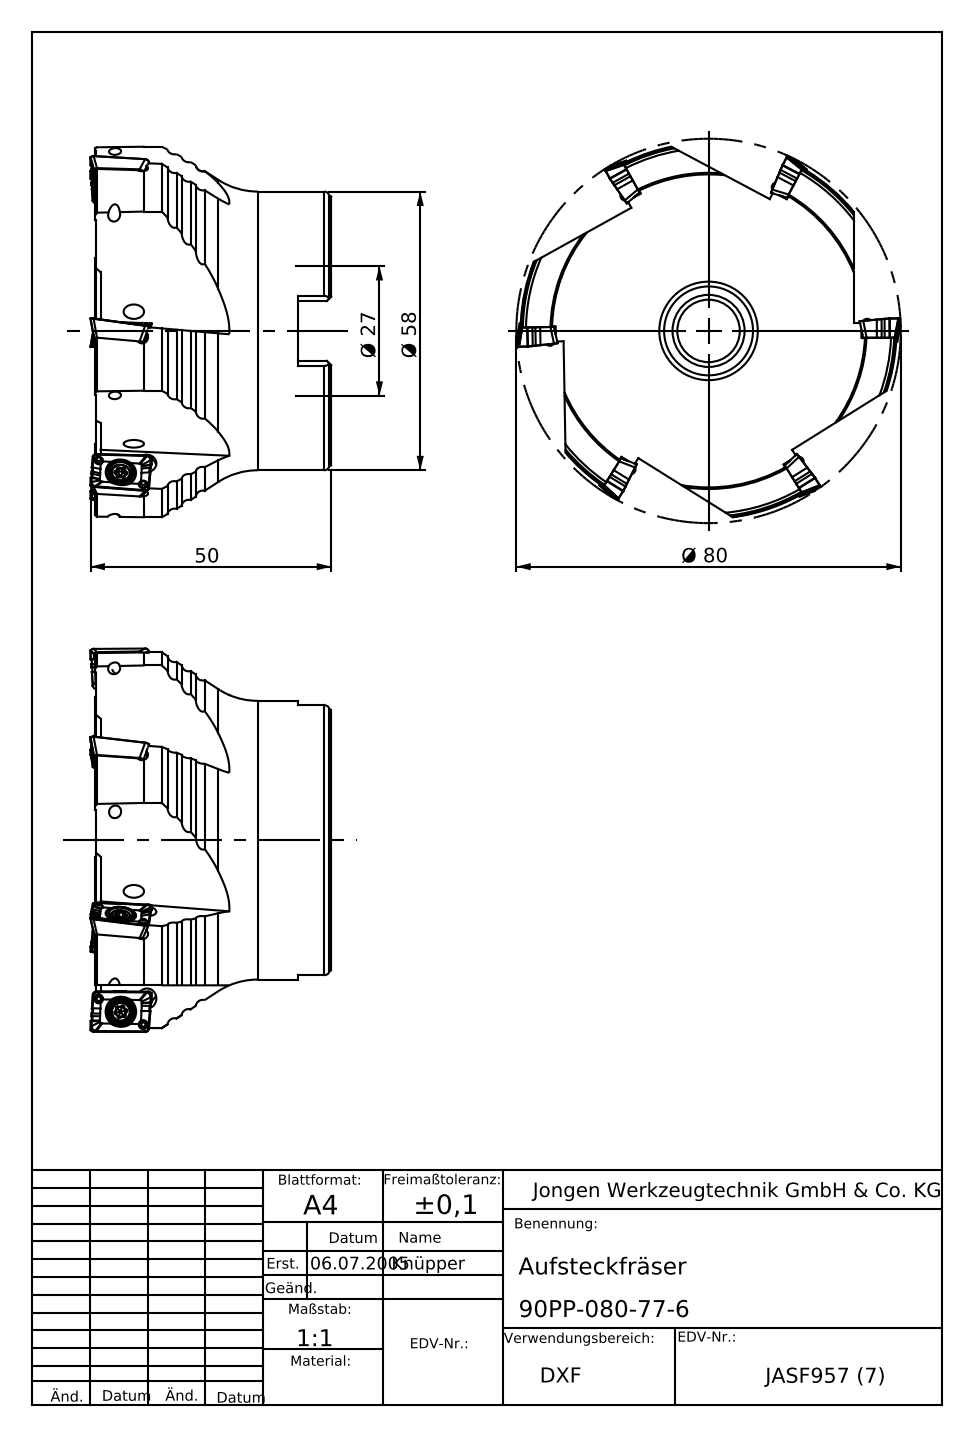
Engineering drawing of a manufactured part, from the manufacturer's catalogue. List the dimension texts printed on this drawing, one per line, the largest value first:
Ø 80
Ø 58
50
Ø 27
